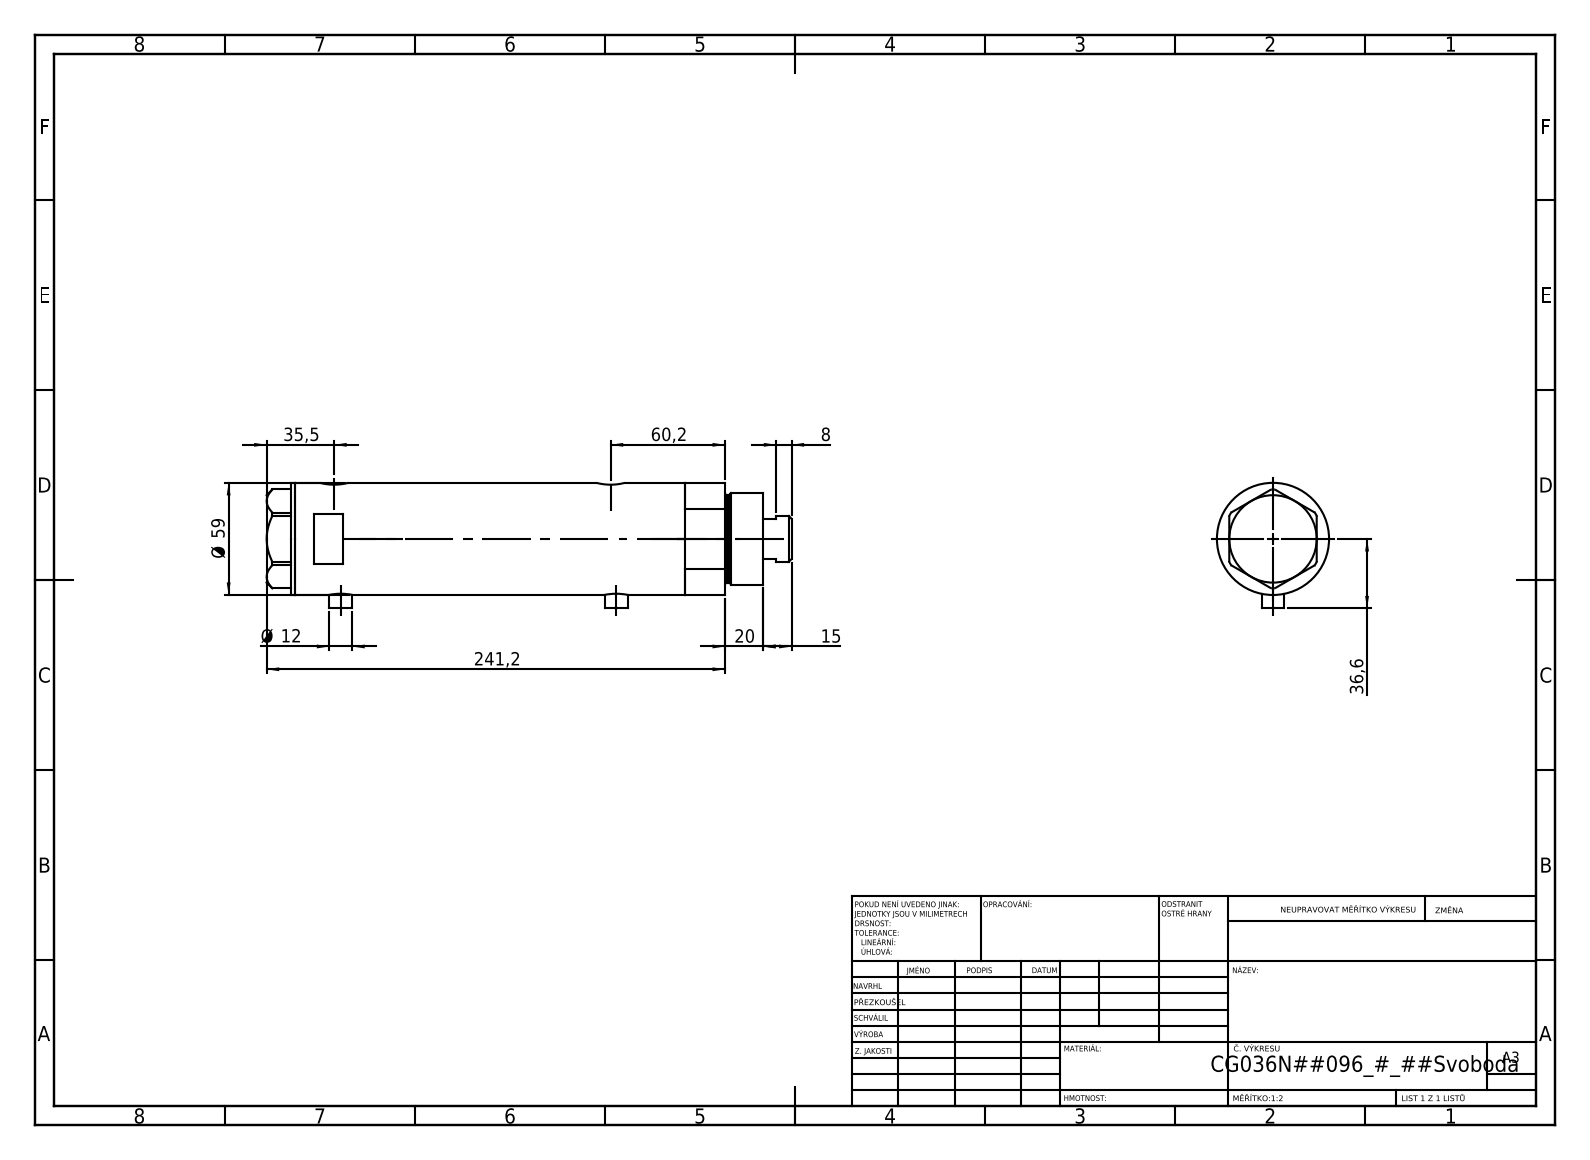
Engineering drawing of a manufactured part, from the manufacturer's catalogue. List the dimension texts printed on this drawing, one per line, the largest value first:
241,2
60,2
Ø 59
36,6
35,5
20
15
Ø 12
8
